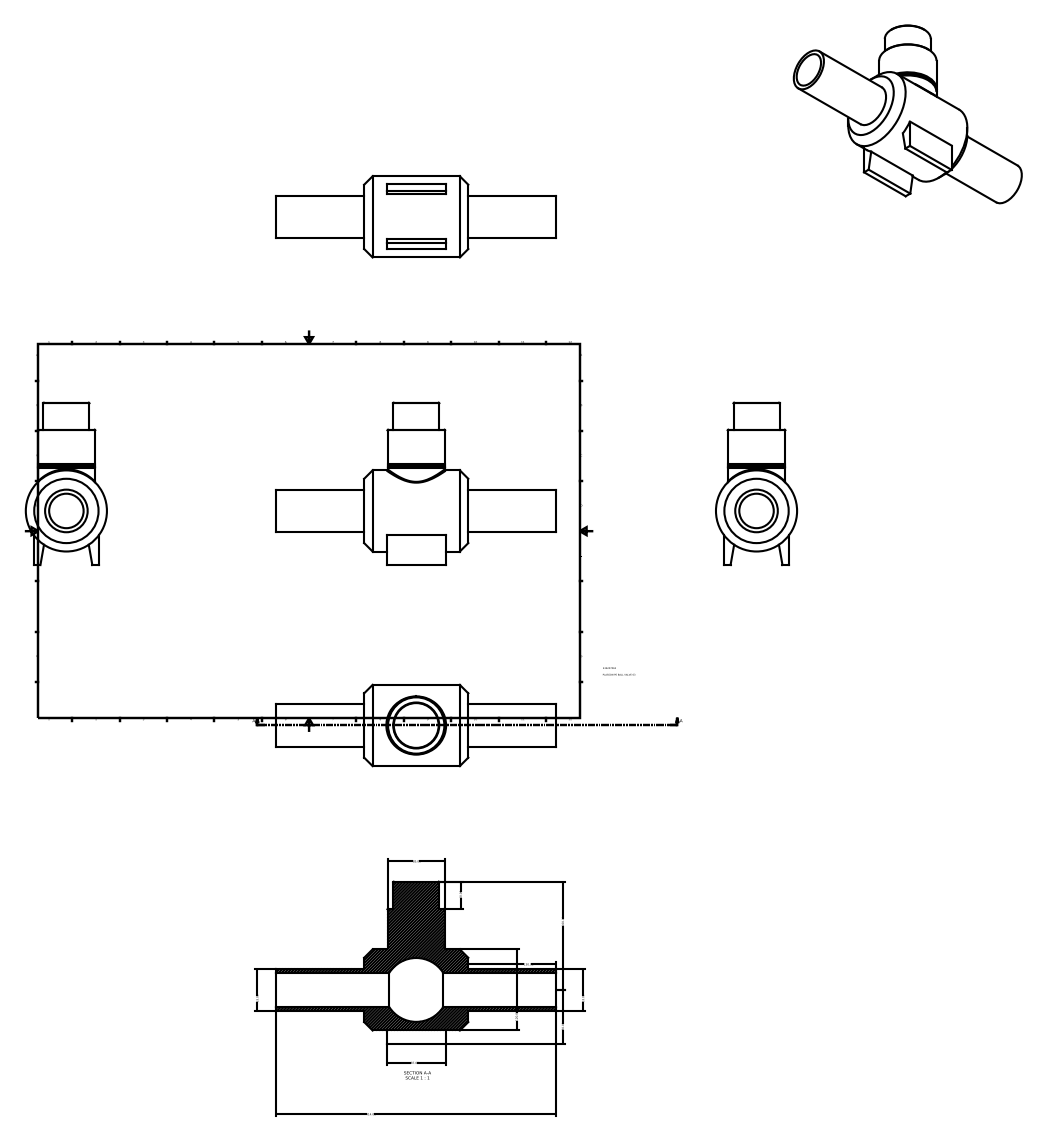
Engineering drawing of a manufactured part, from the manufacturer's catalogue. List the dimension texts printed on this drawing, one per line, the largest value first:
414.00
160.00
130.00
120.00
87.00
85.00
80.00
63.00
63.00
40.00
